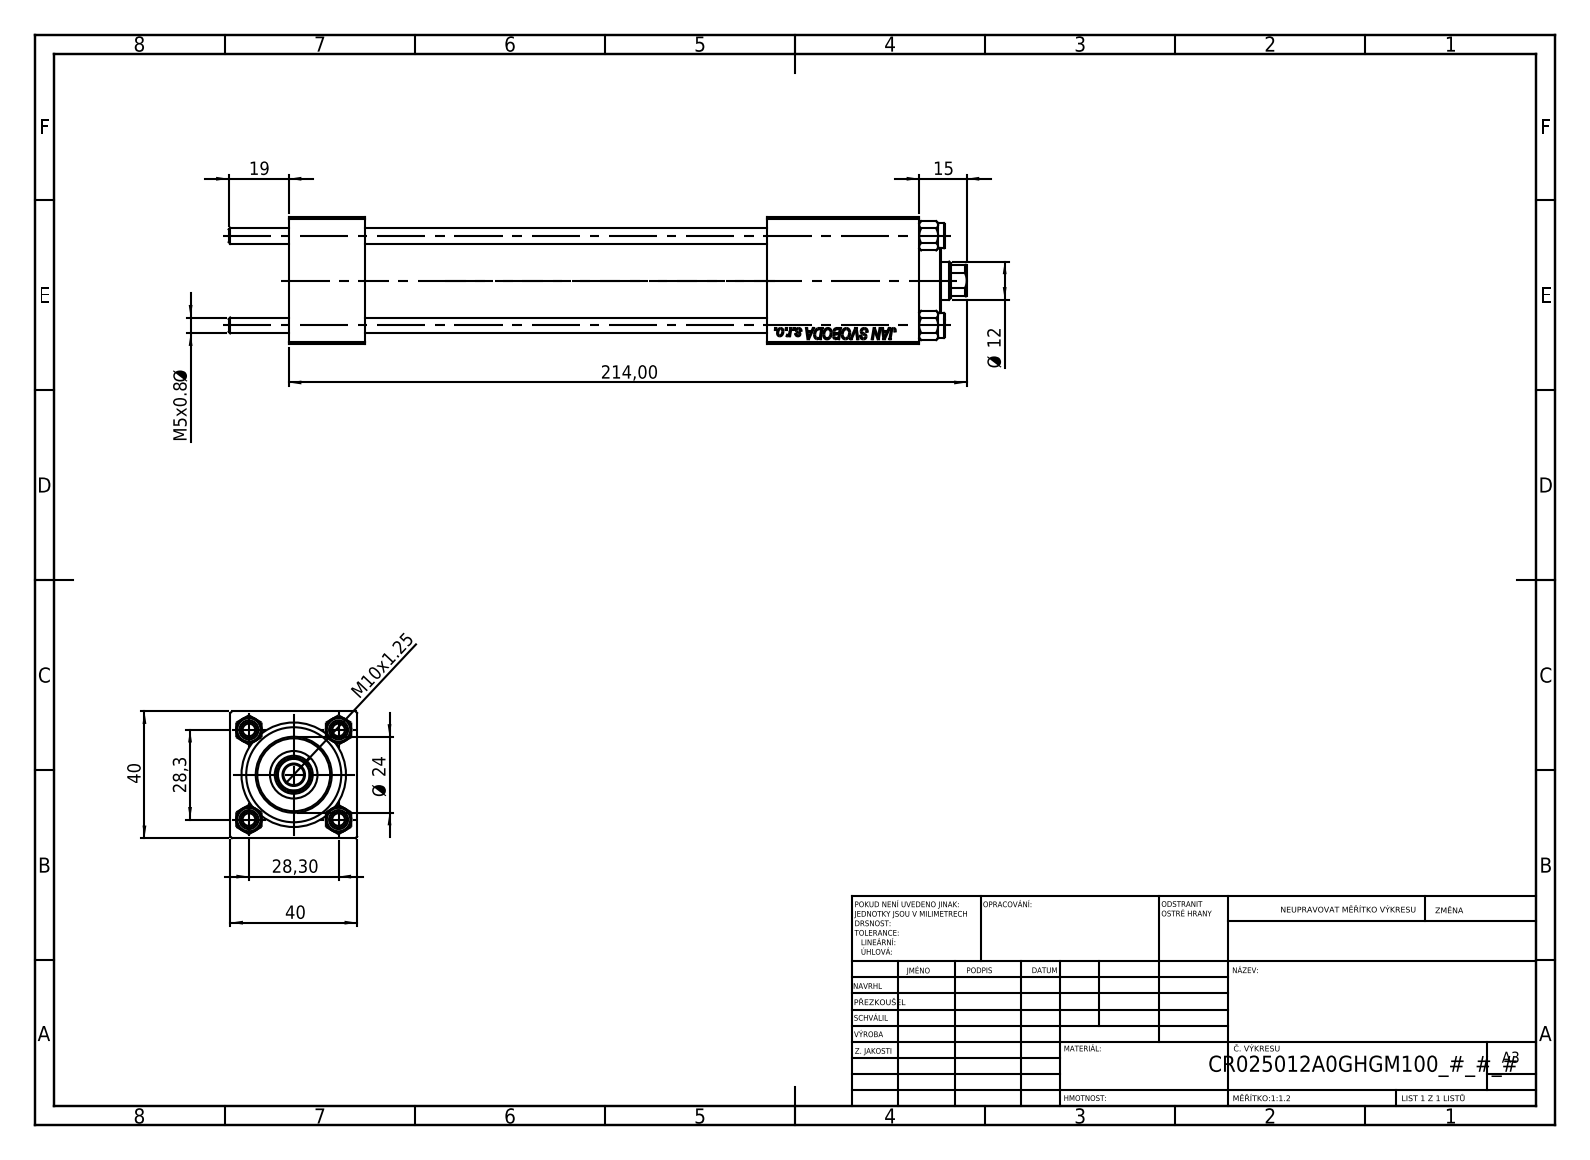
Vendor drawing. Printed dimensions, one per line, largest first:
214,00
40
40
28,3
28,30
Ø 24
19
15
Ø 12
M10x1.25
M5x0.8 Ø
